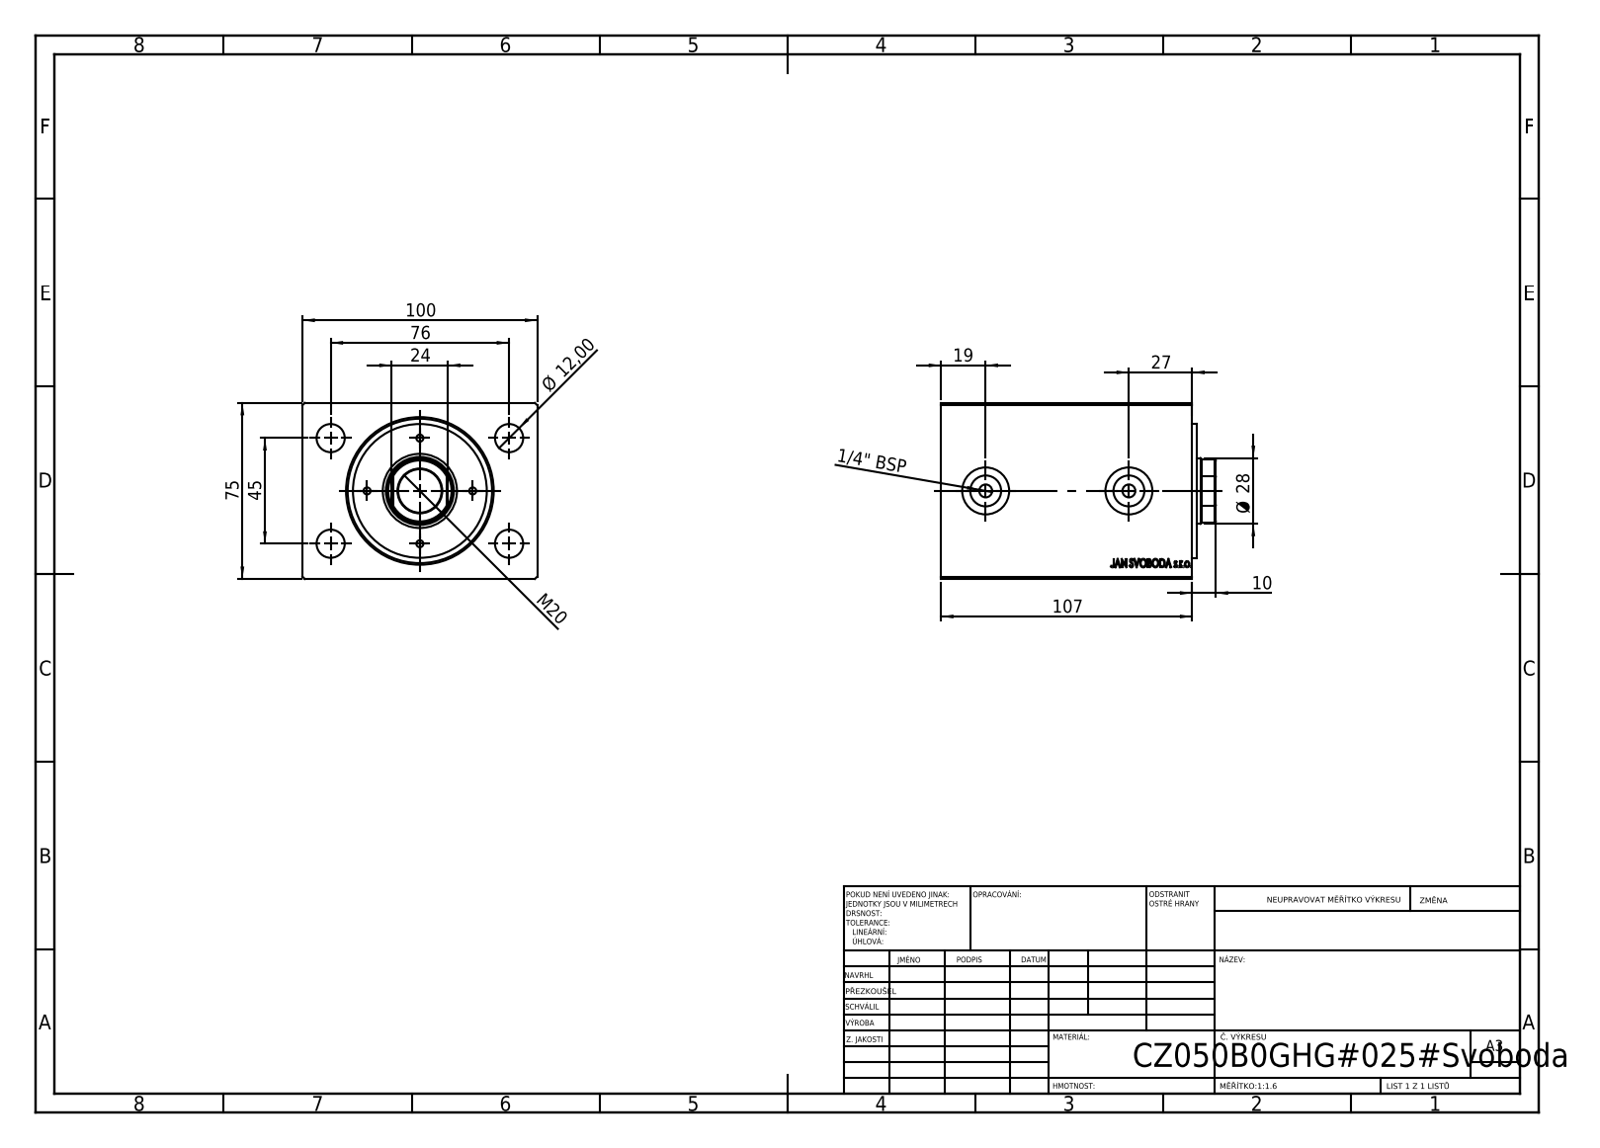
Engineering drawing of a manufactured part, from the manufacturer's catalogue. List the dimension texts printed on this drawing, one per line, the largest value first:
107
100
76
75
45
Ø 28
27
24
M20
19
Ø 12,00
10
1/4" BSP
